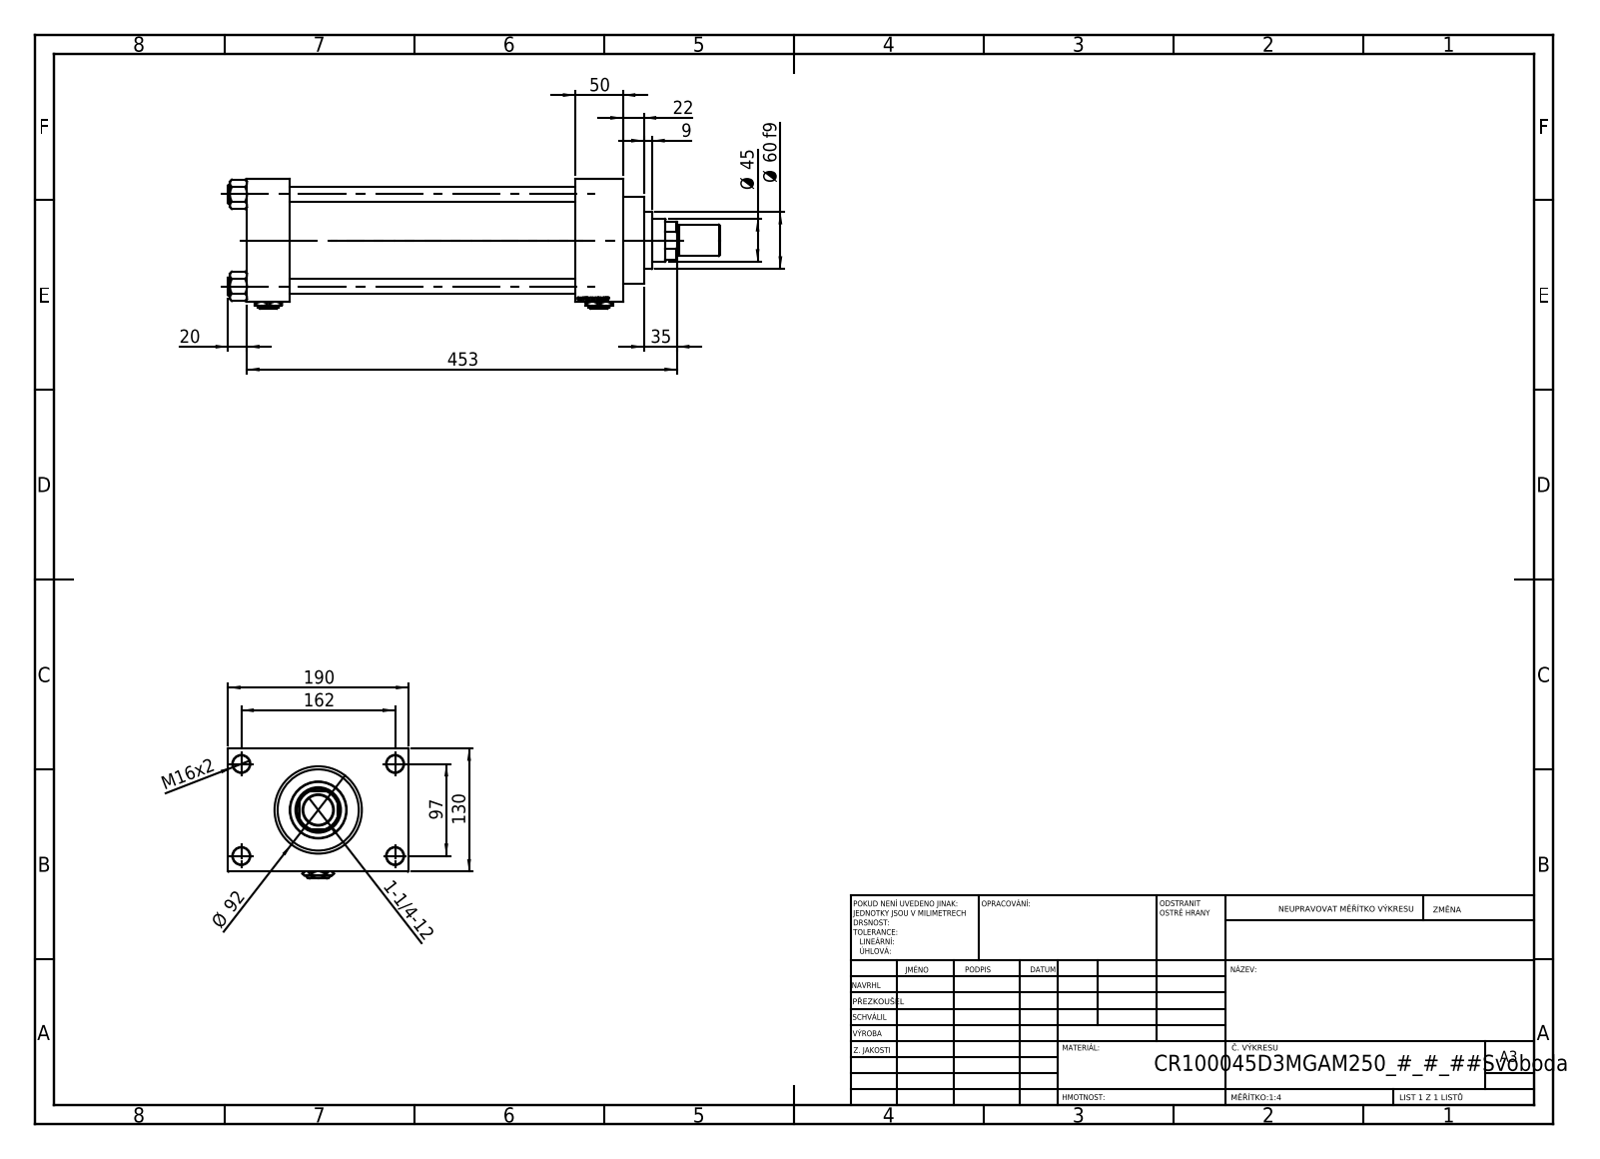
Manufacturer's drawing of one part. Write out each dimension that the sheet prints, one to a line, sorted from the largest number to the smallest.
453
190
162
130
97
Ø 92
Ø 60 f9
50
Ø 45
35
22
20
M16x2
9
1-1/4-12
